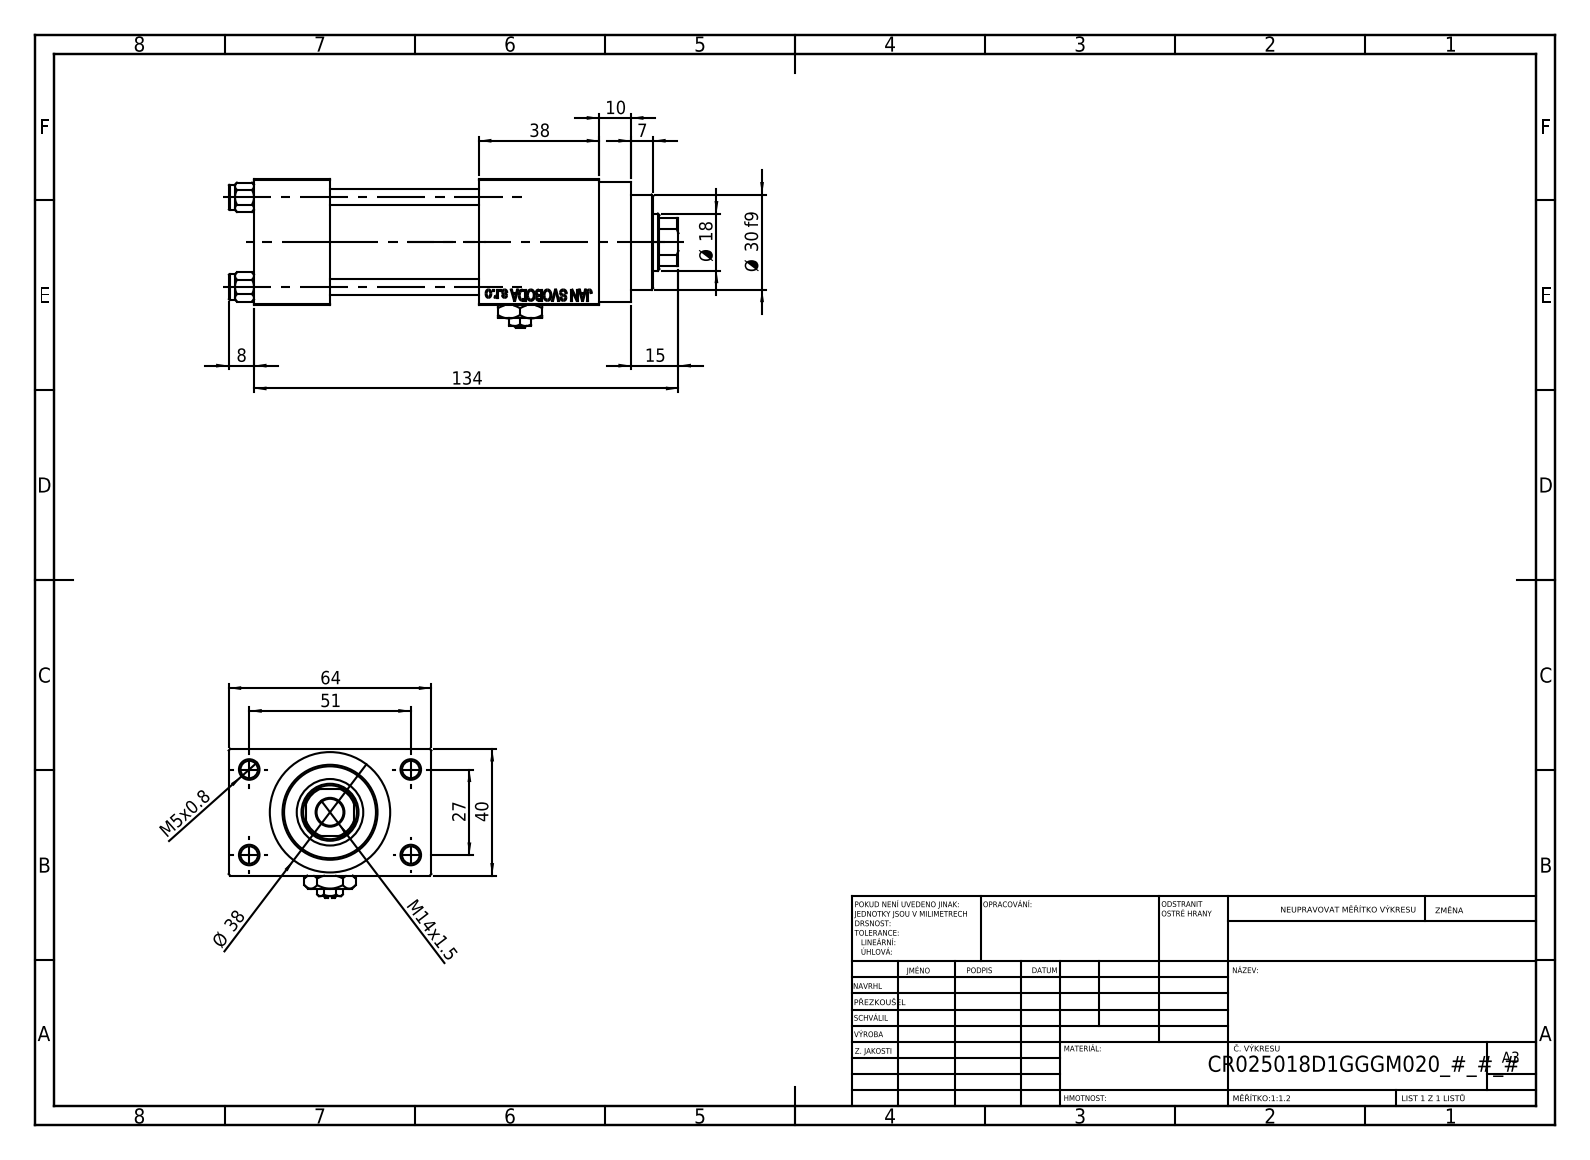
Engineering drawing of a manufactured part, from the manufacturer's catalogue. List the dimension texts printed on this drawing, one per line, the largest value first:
134
64
51
40
38
Ø 38
Ø 30 f9
27
Ø 18
15
M14x1.5
10
8
7
M5x0.8
